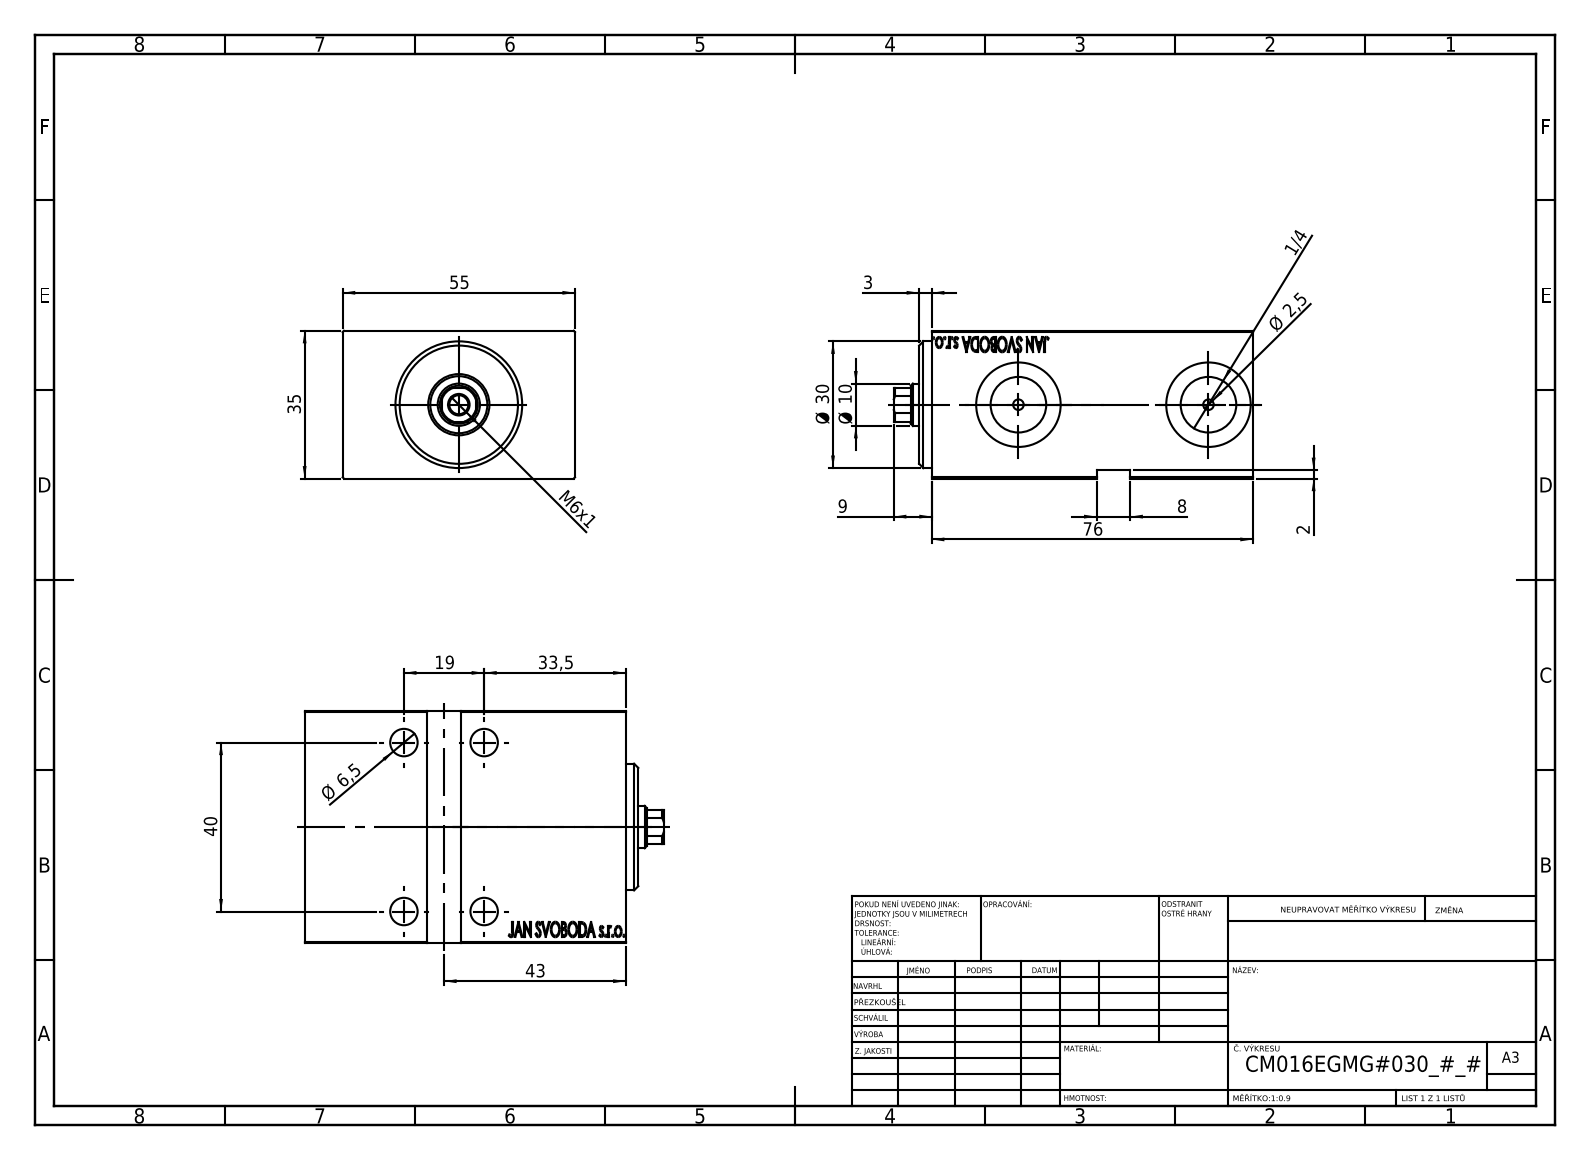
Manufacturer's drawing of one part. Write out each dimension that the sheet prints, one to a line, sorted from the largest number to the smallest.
76
55
43
40
35
33,5
Ø 30
19
Ø 10
9
8
Ø 6,5
M6x1
3
Ø 2,5
2
1/4
